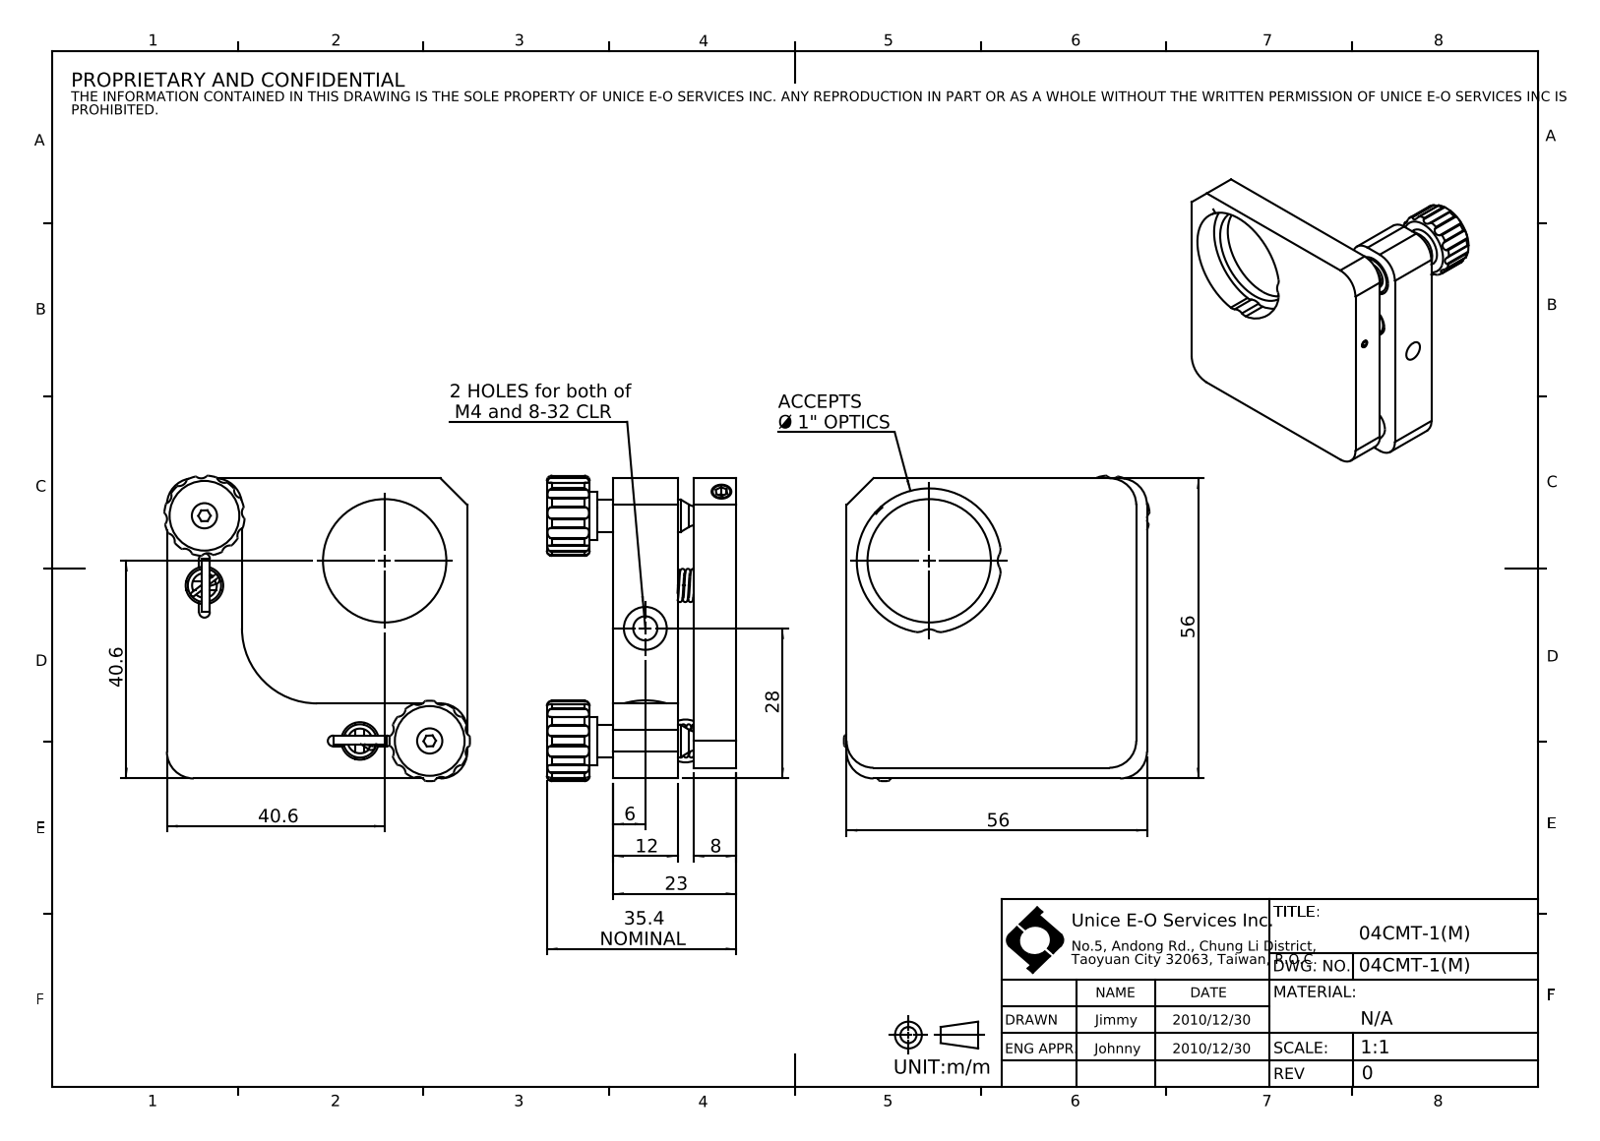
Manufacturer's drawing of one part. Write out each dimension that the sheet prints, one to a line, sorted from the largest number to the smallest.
56
56
40.6
40.6
35.4 NOMINAL
28
23
12
8
6
2 HOLES for both of M4 and 8-32 CLR
ACCEPTS Ø 1" OPTICS
